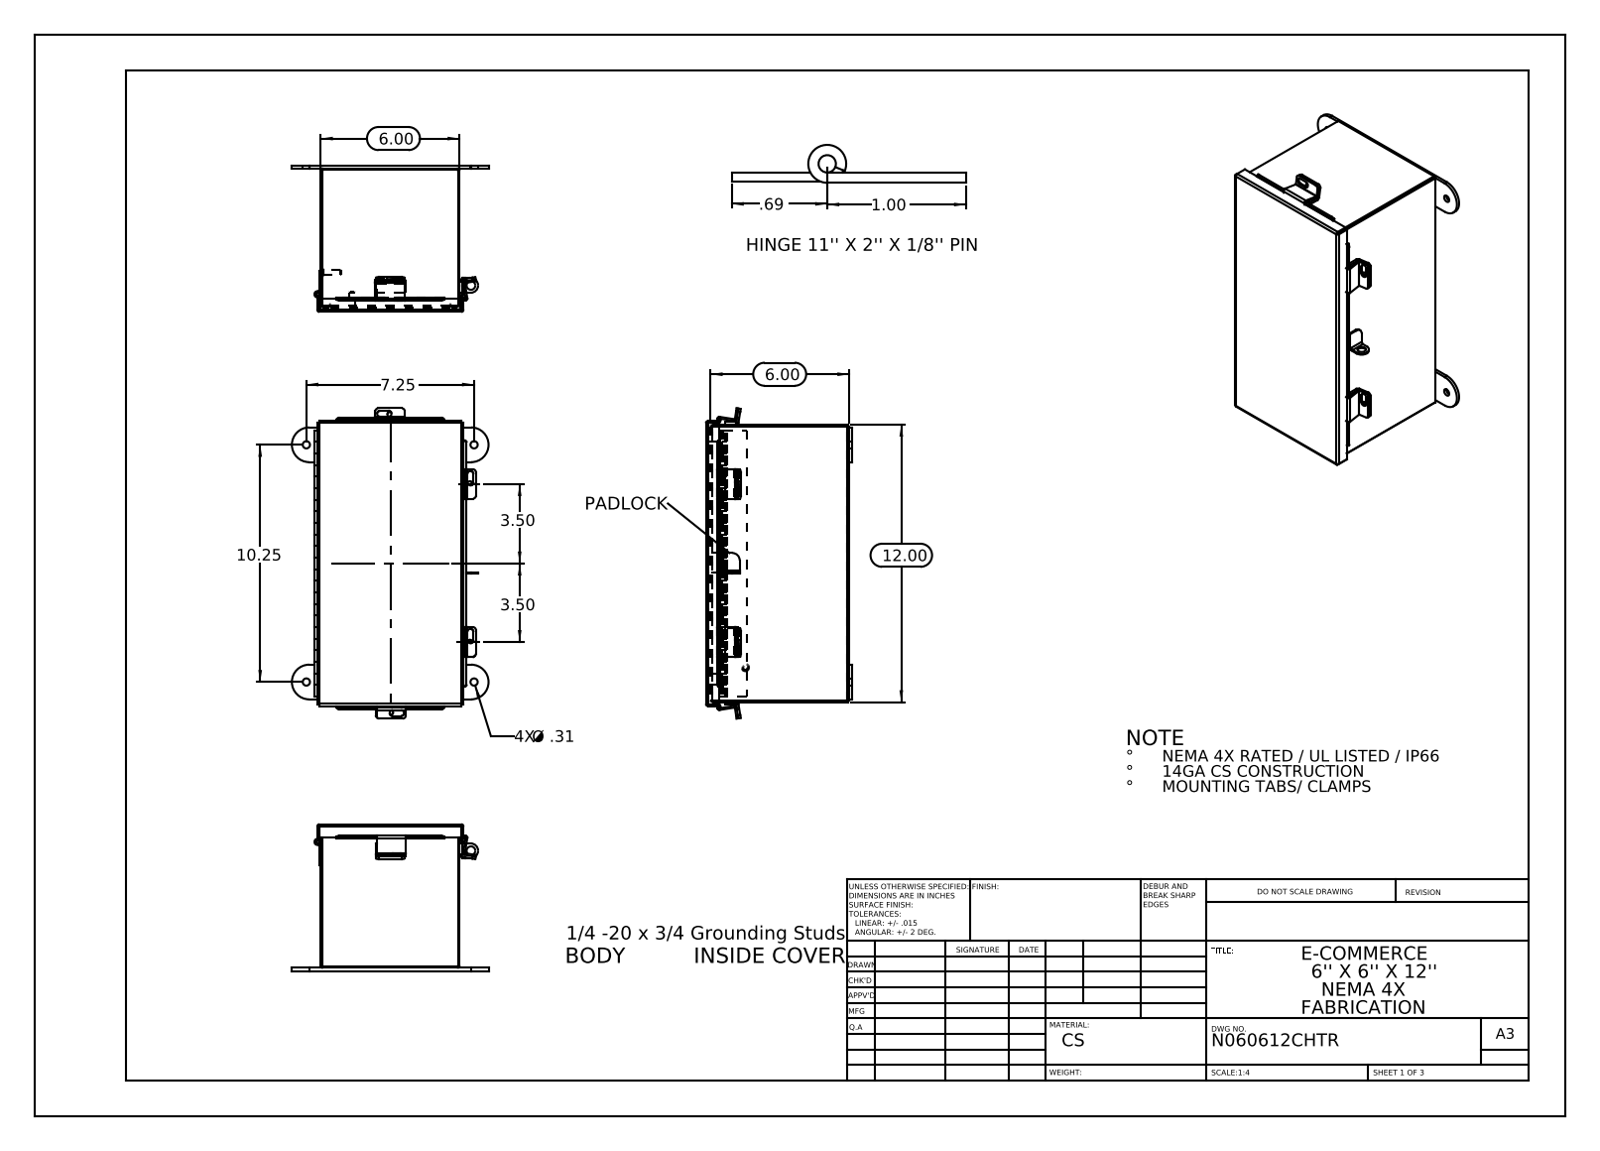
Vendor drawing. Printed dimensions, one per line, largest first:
12.00
10.25
7.25
6.00
6.00
3.50
3.50
1.00
.69
4X Ø .31
